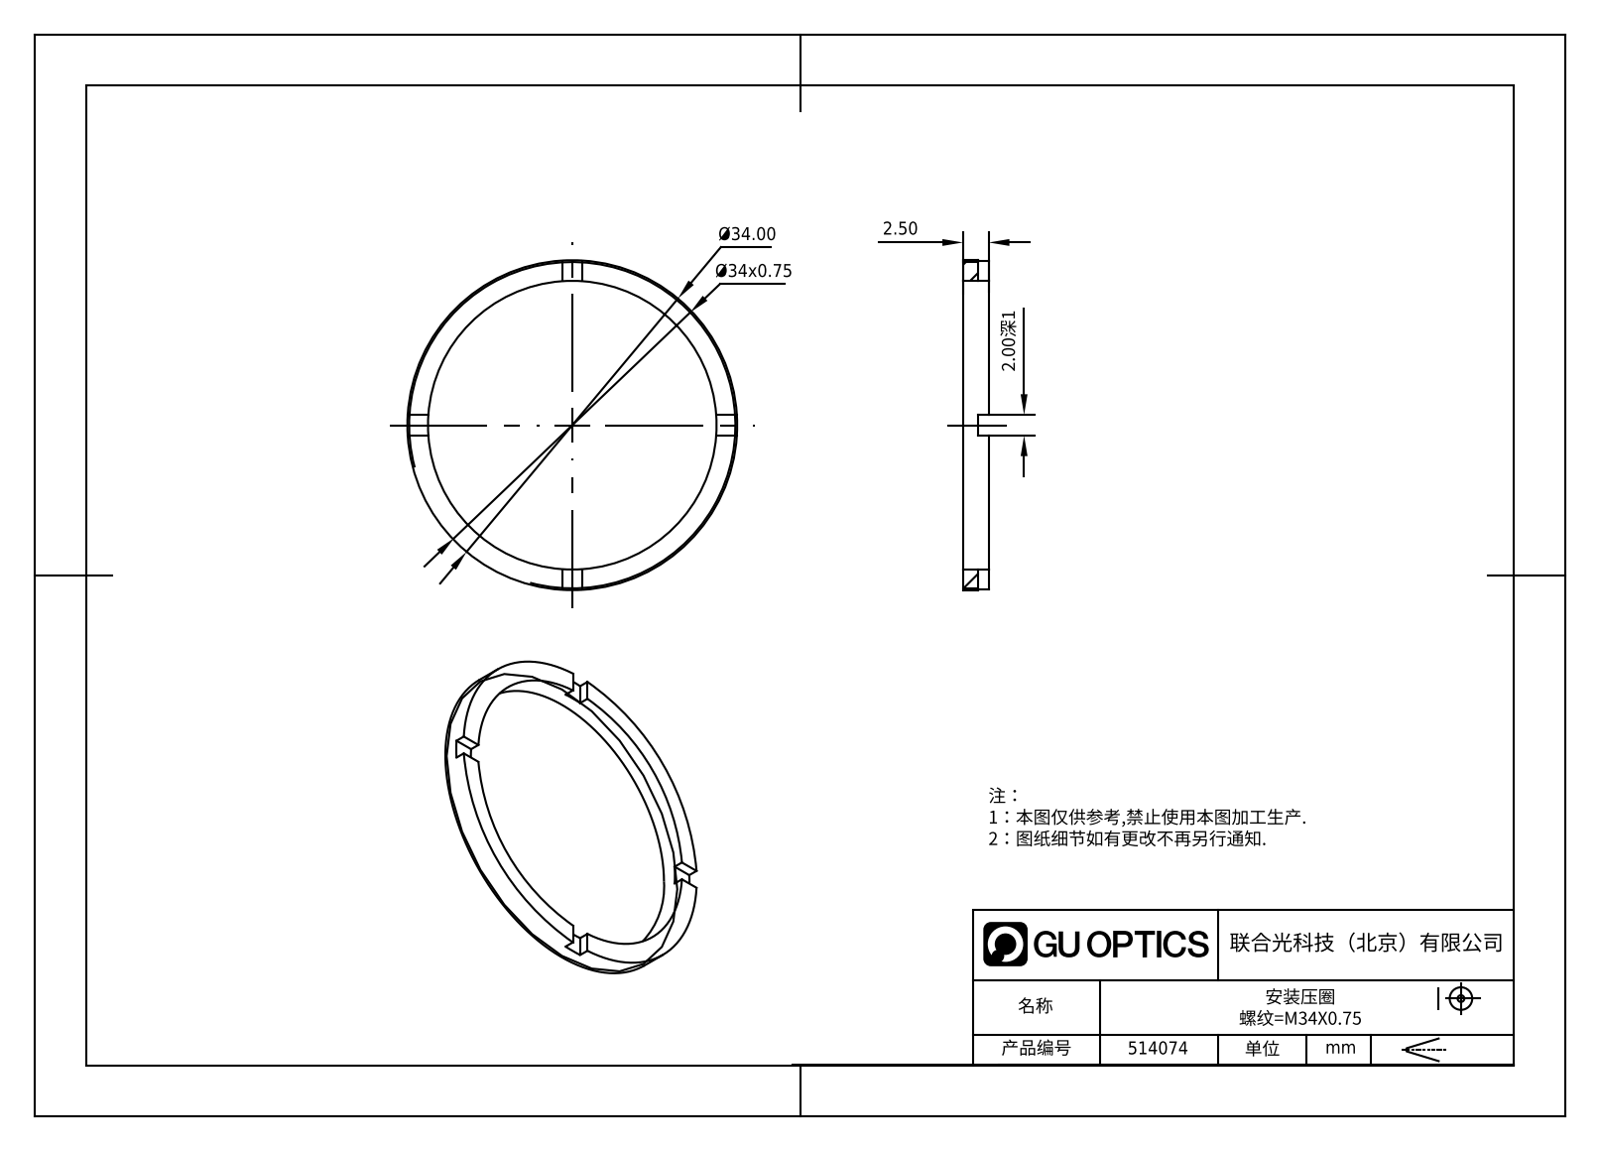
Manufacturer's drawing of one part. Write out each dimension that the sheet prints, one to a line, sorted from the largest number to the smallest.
Ø34.00
Ø34x0.75
2.50
2.00深1
